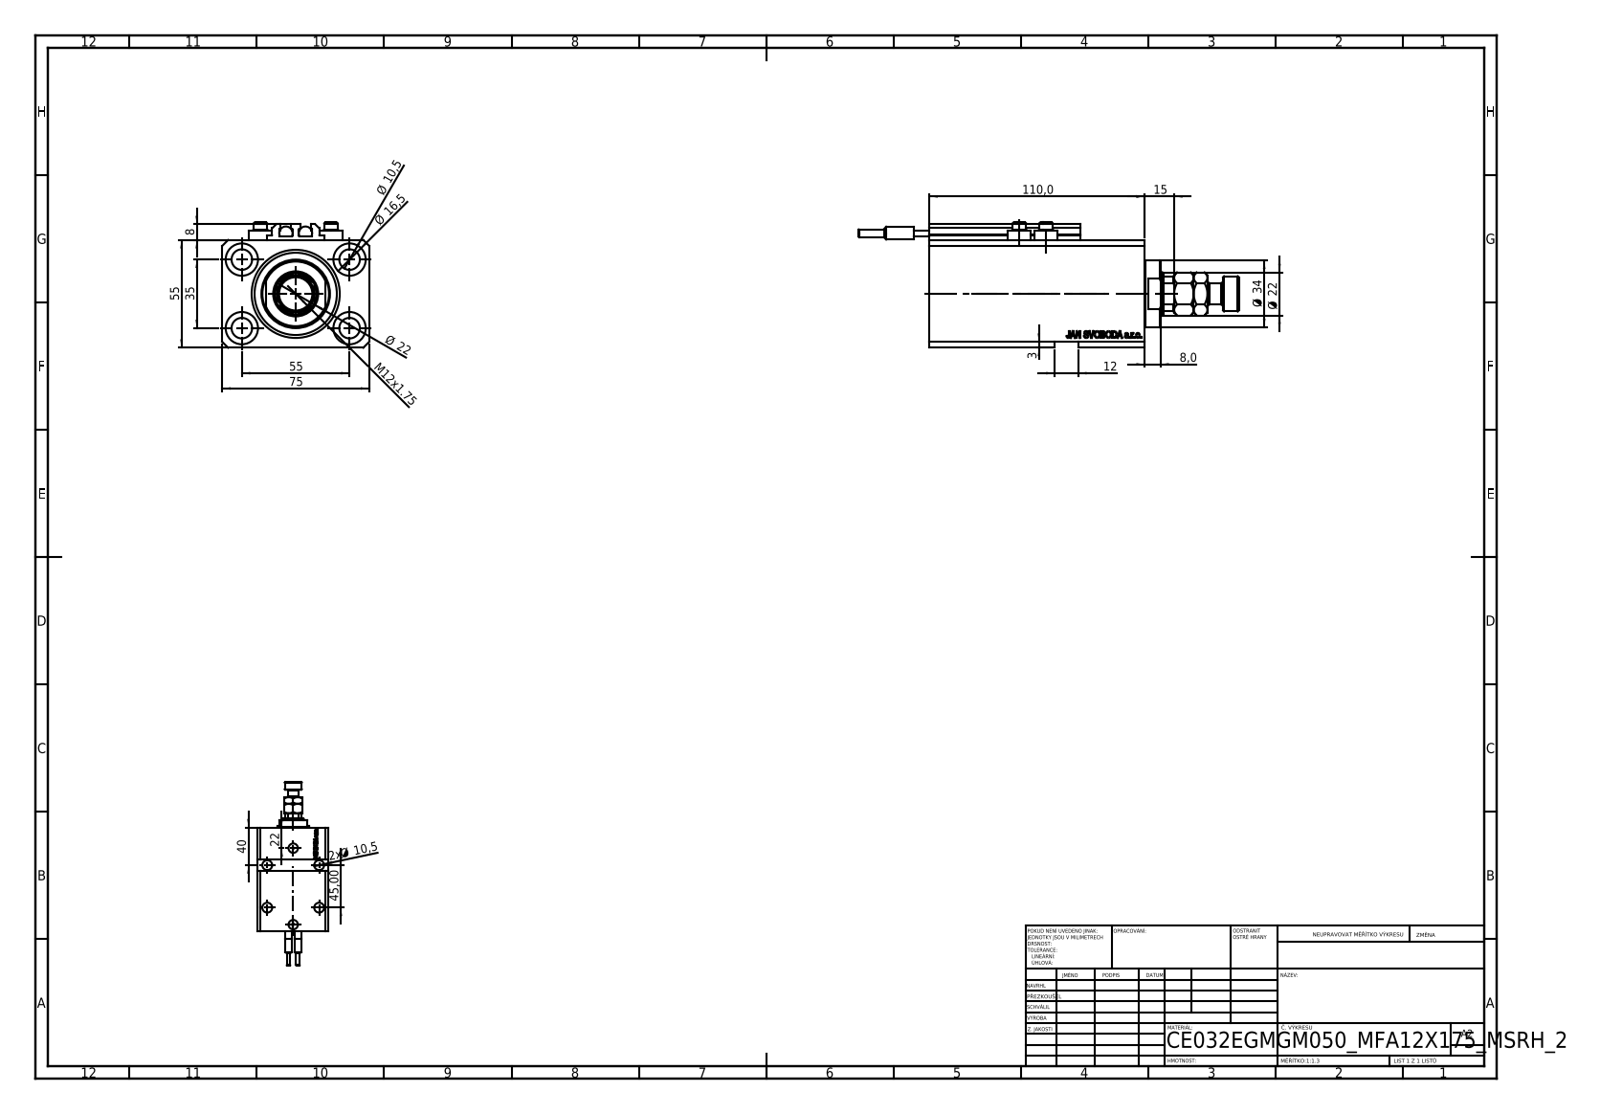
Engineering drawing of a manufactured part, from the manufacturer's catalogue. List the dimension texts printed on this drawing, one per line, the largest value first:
110,0
75
55
55
45,00
40
35
Ø 34
Ø 22
Ø 22
22
Ø 16,5
15
M12x1.75
12
Ø 10,5
2x Ø 10,5
8
8,0
3
